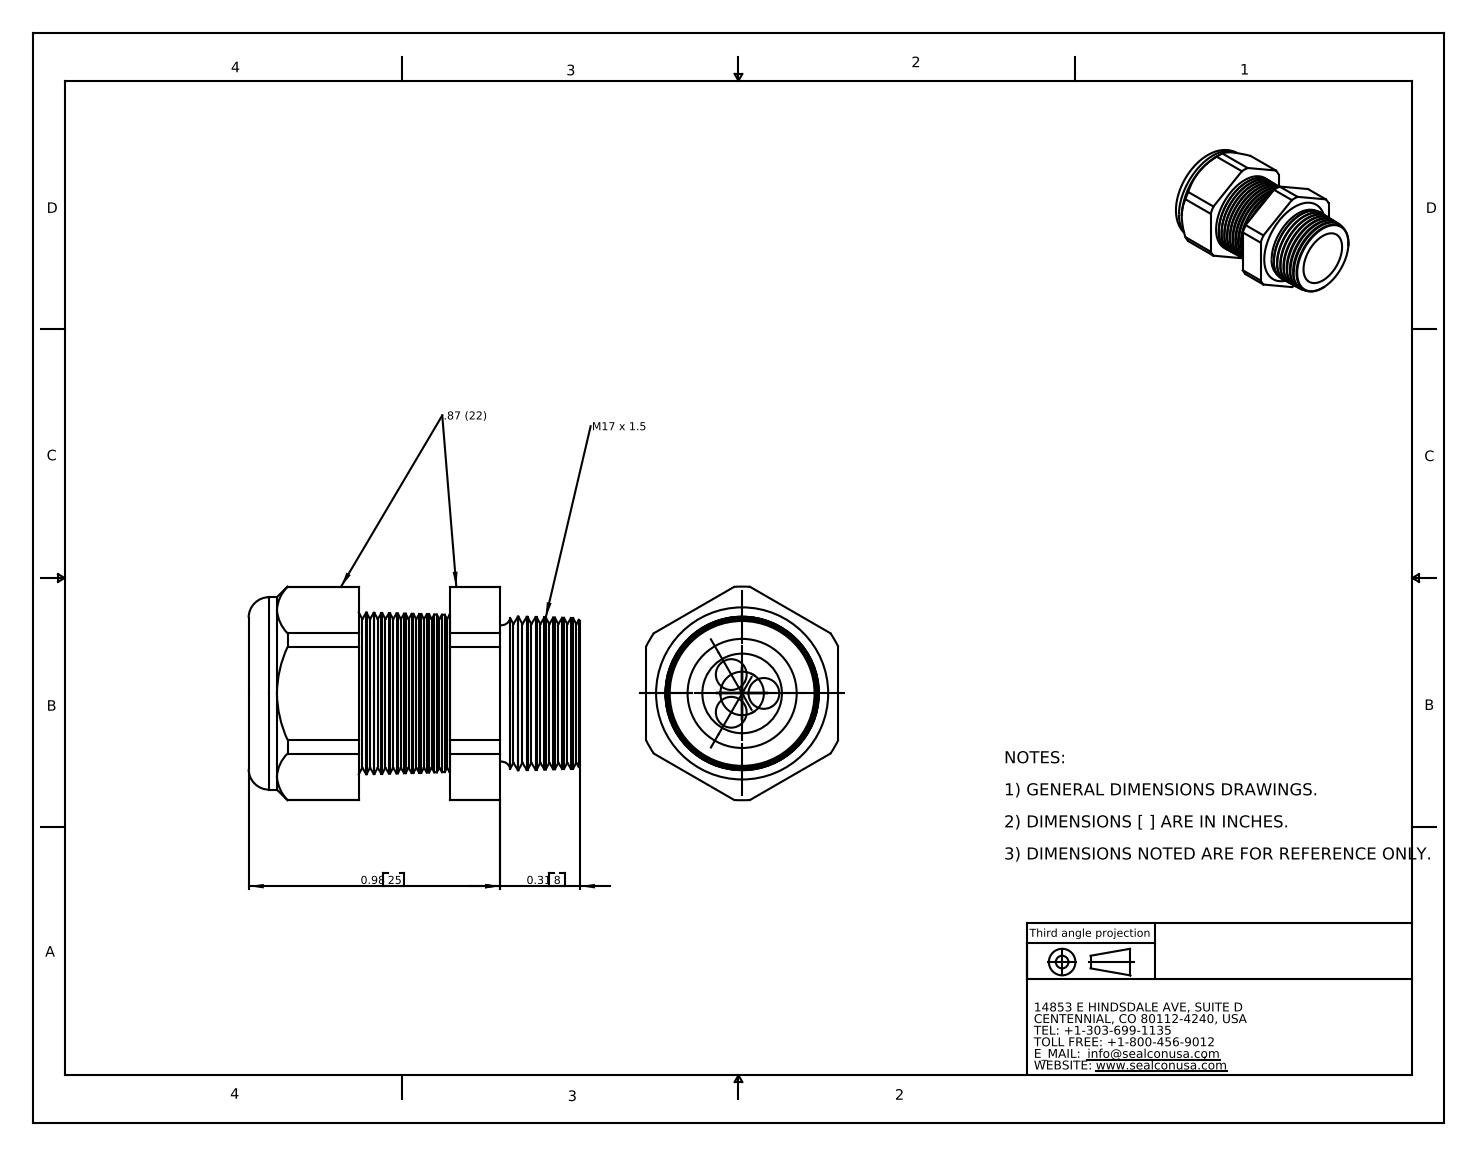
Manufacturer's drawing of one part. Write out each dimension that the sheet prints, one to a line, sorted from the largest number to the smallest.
0.98 25
0.31 8
